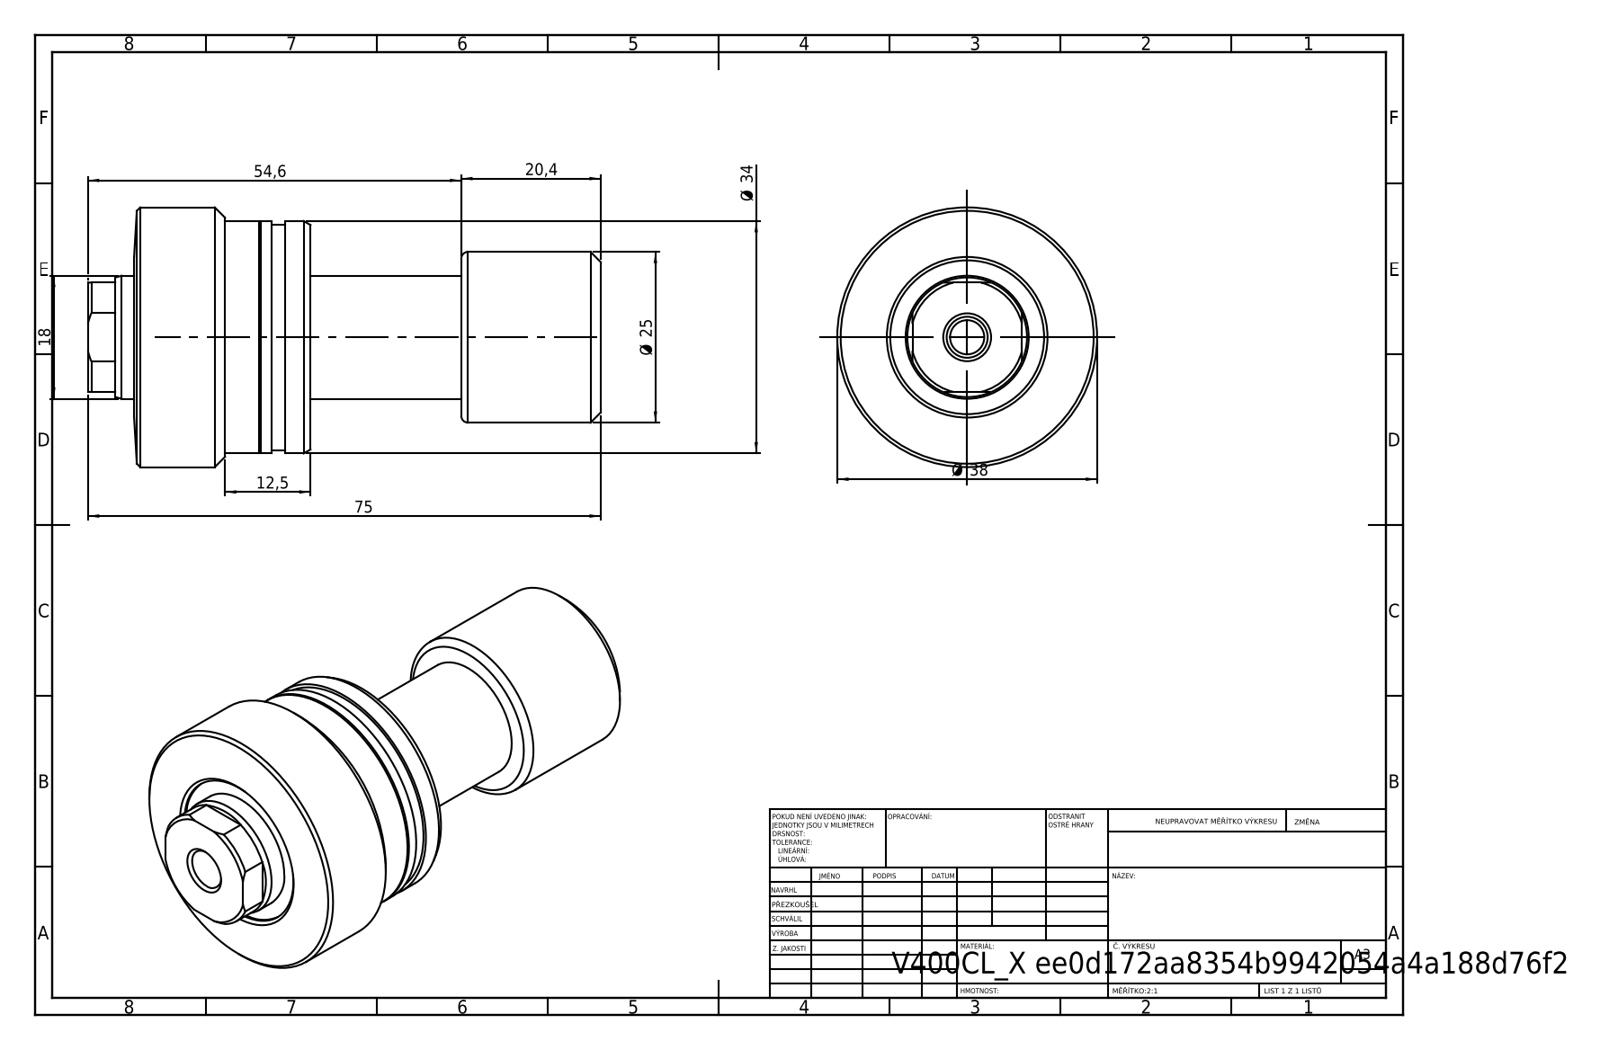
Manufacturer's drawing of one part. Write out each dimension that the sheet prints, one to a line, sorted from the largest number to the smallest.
75
54,6
Ø 38
Ø 34
Ø 25
20,4
18
12,5
